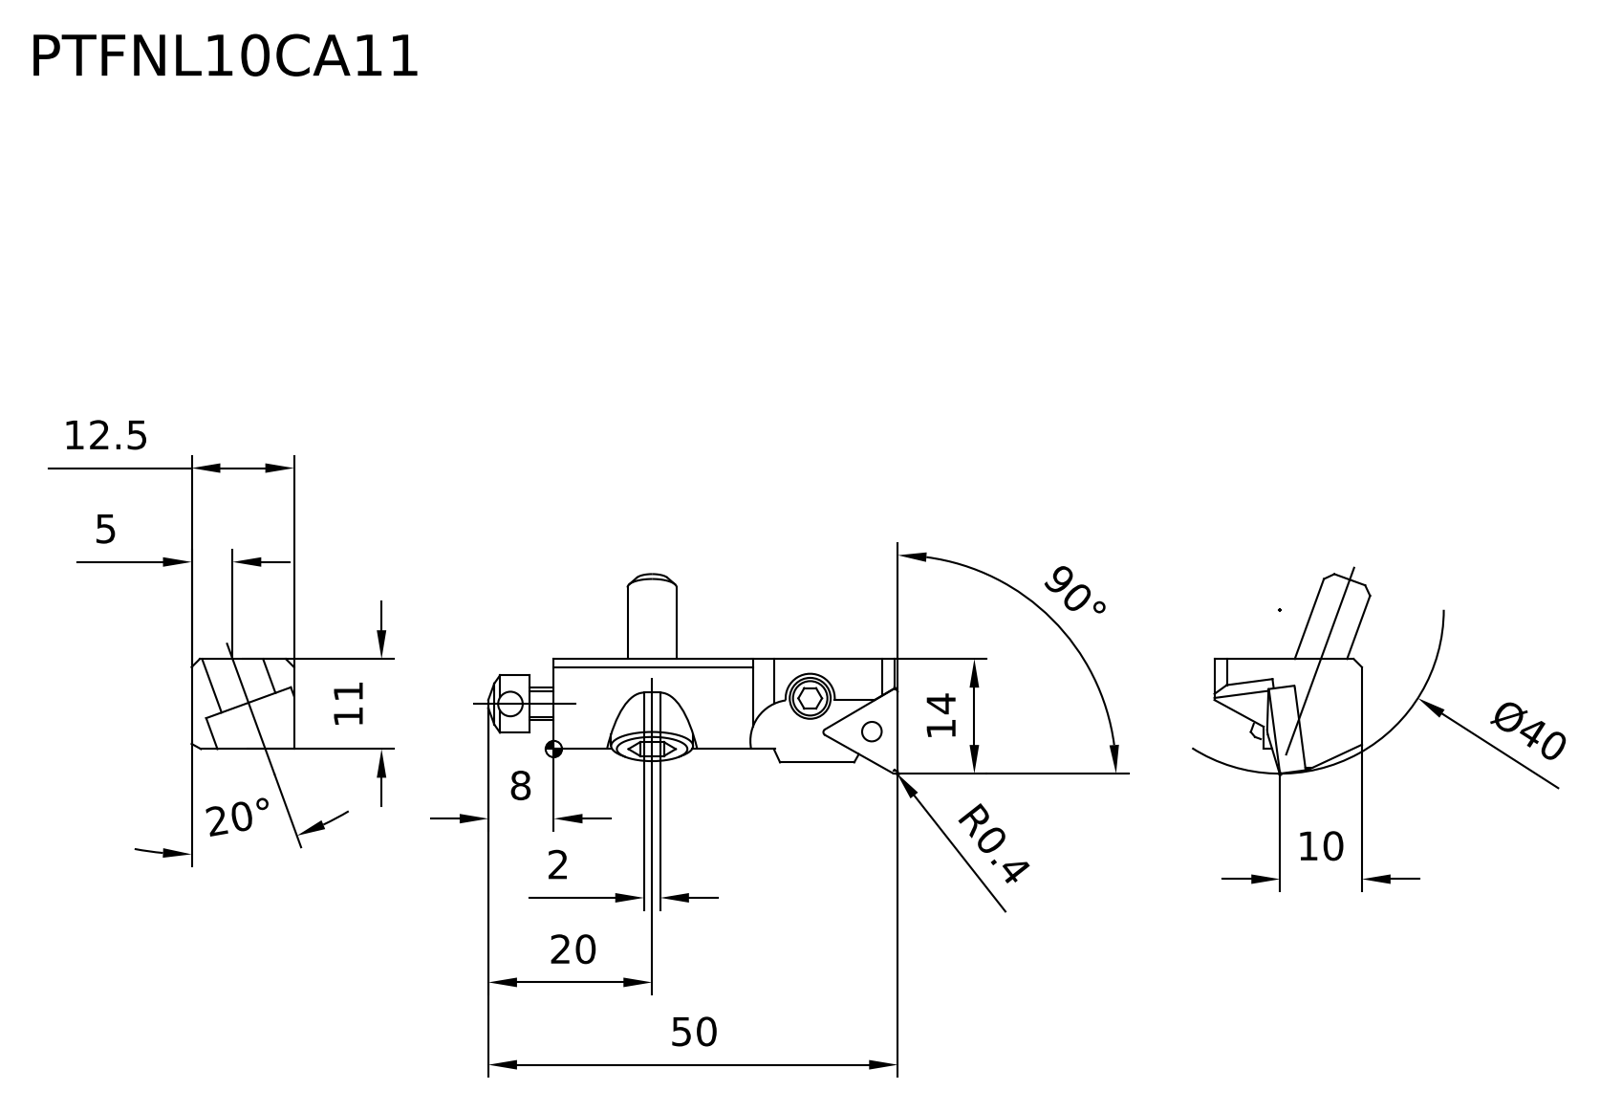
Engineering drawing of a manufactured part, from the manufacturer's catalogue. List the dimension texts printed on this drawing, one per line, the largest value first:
90°
50
Ø40
20°
20
14
12.5
11
10
8
5
2
R0.4
